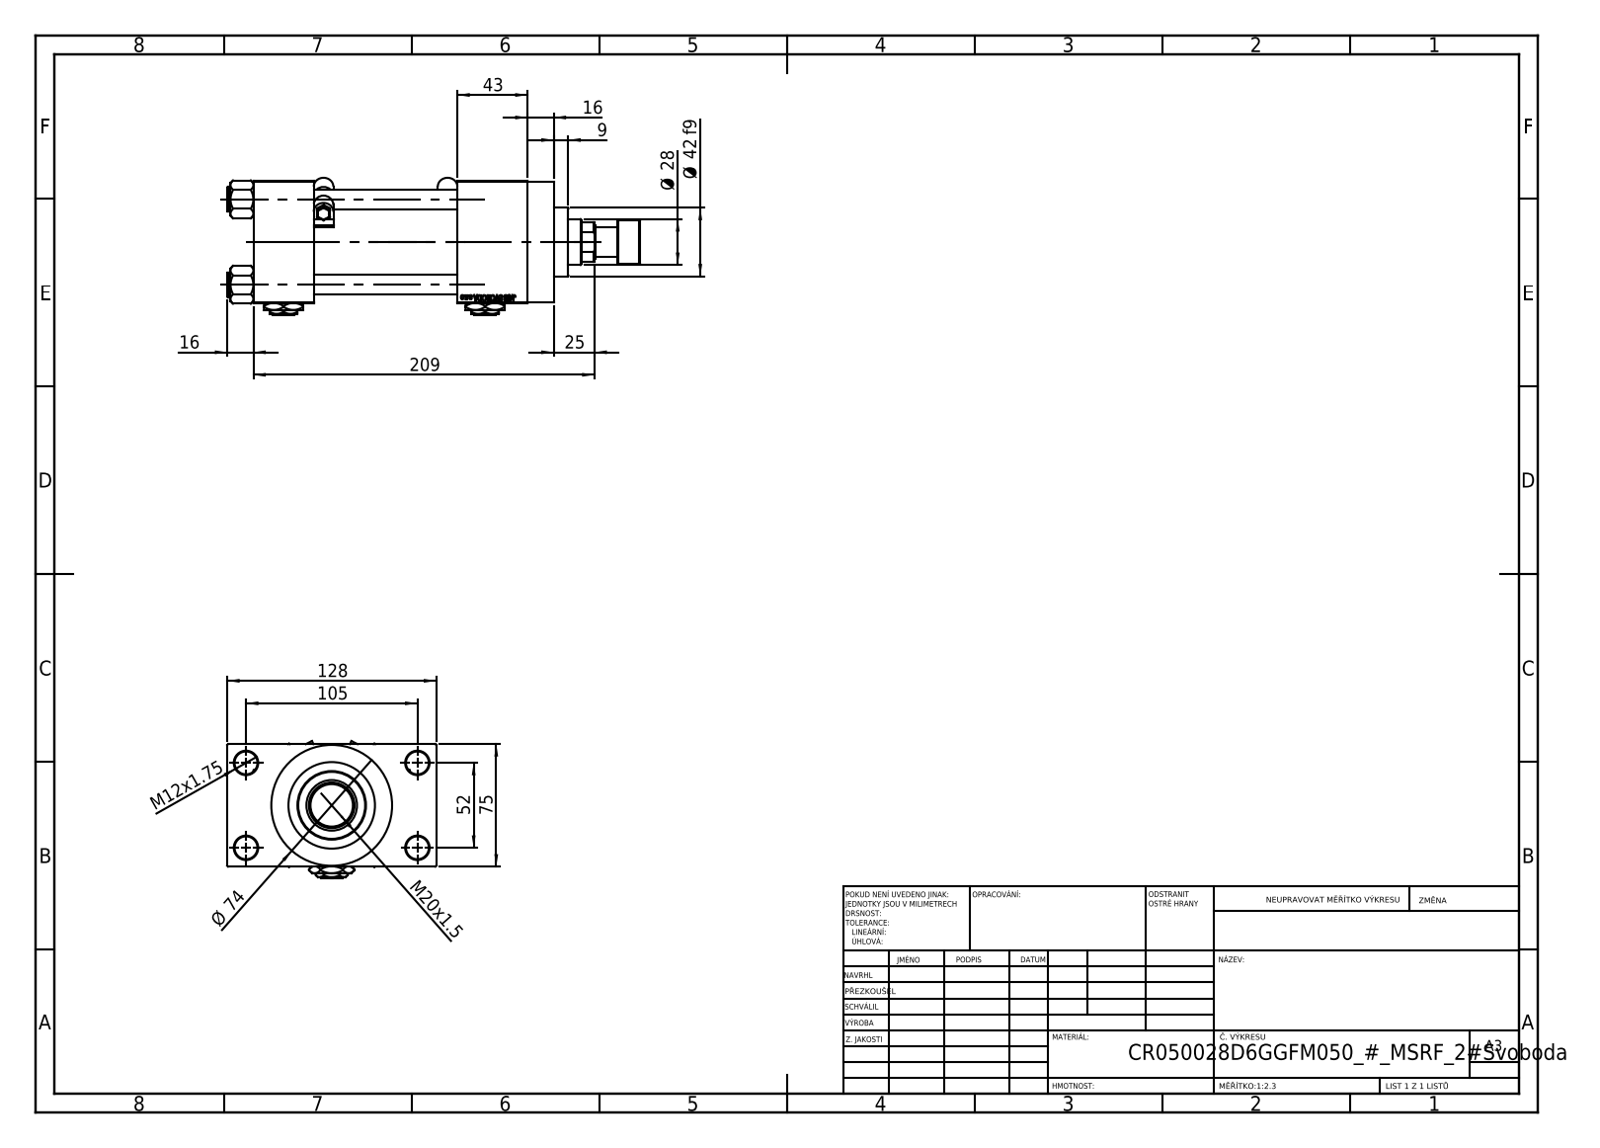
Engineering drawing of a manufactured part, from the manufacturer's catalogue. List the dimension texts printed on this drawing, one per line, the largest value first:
209
128
105
75
Ø 74
52
43
Ø 42 f9
Ø 28
25
M20x1.5
16
16
M12x1.75
9
